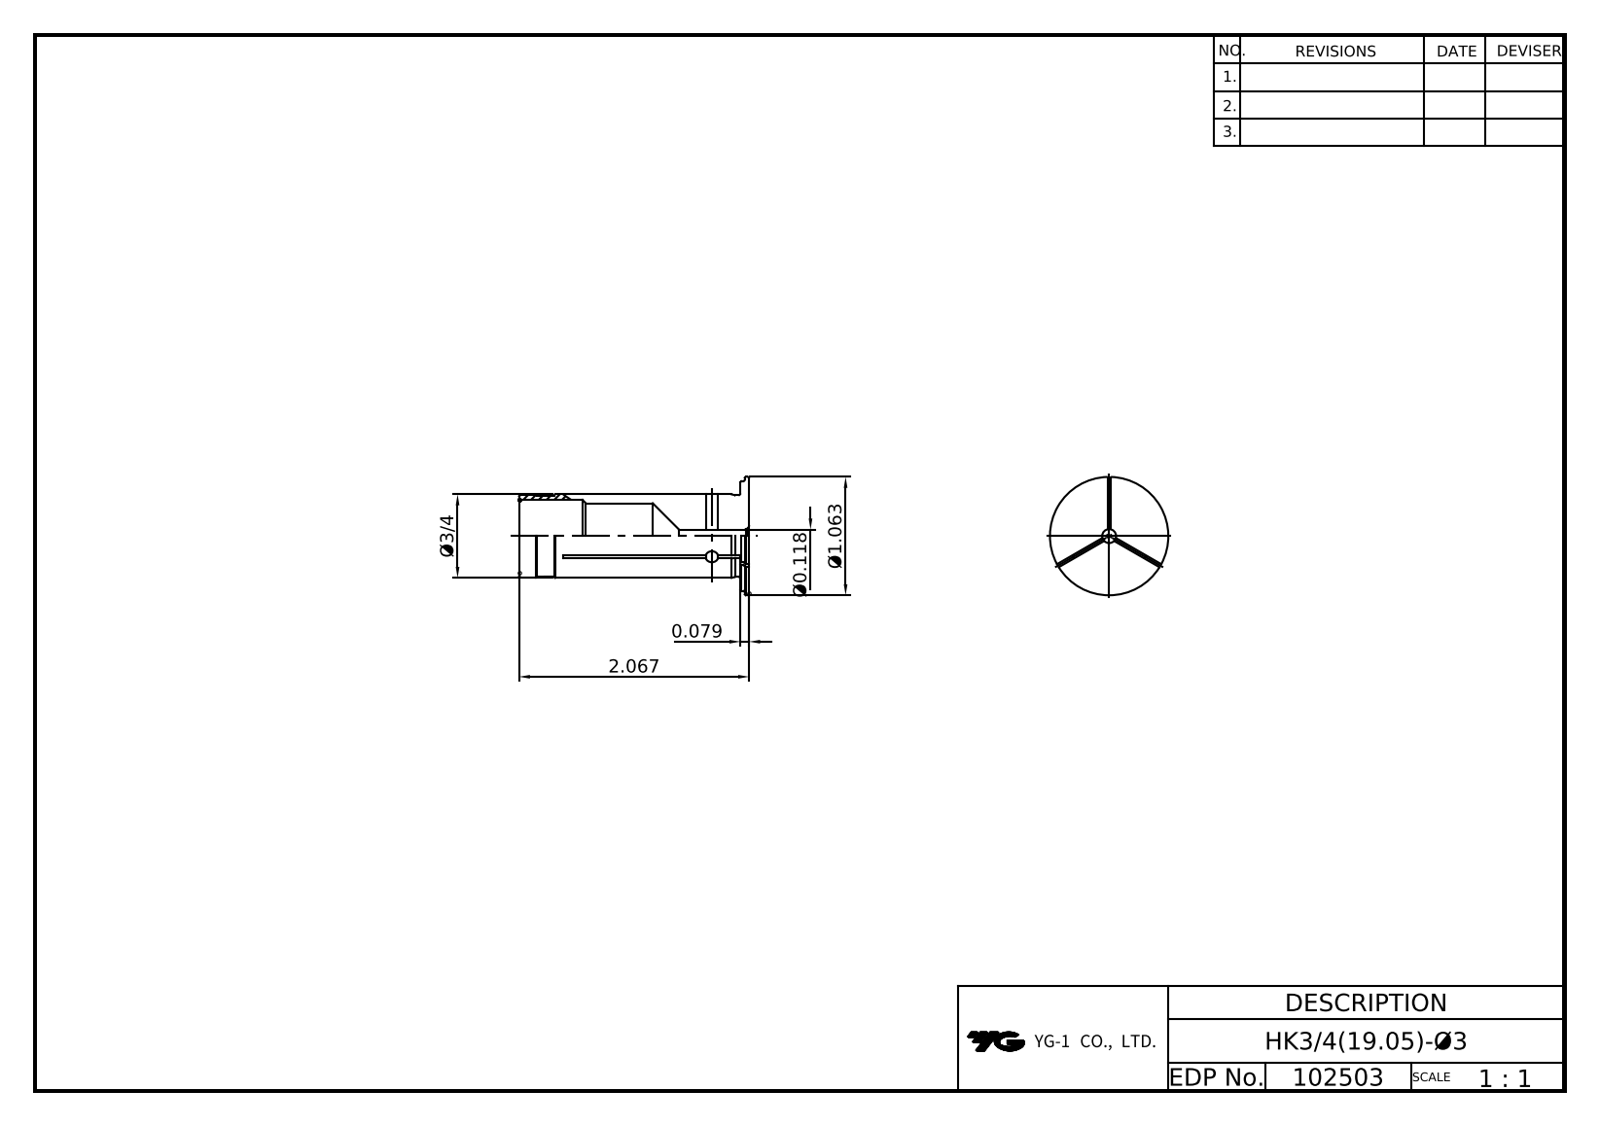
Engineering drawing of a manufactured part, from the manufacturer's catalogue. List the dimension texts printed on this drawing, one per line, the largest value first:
2.067
Ø1.063
Ø3/4
0.079
